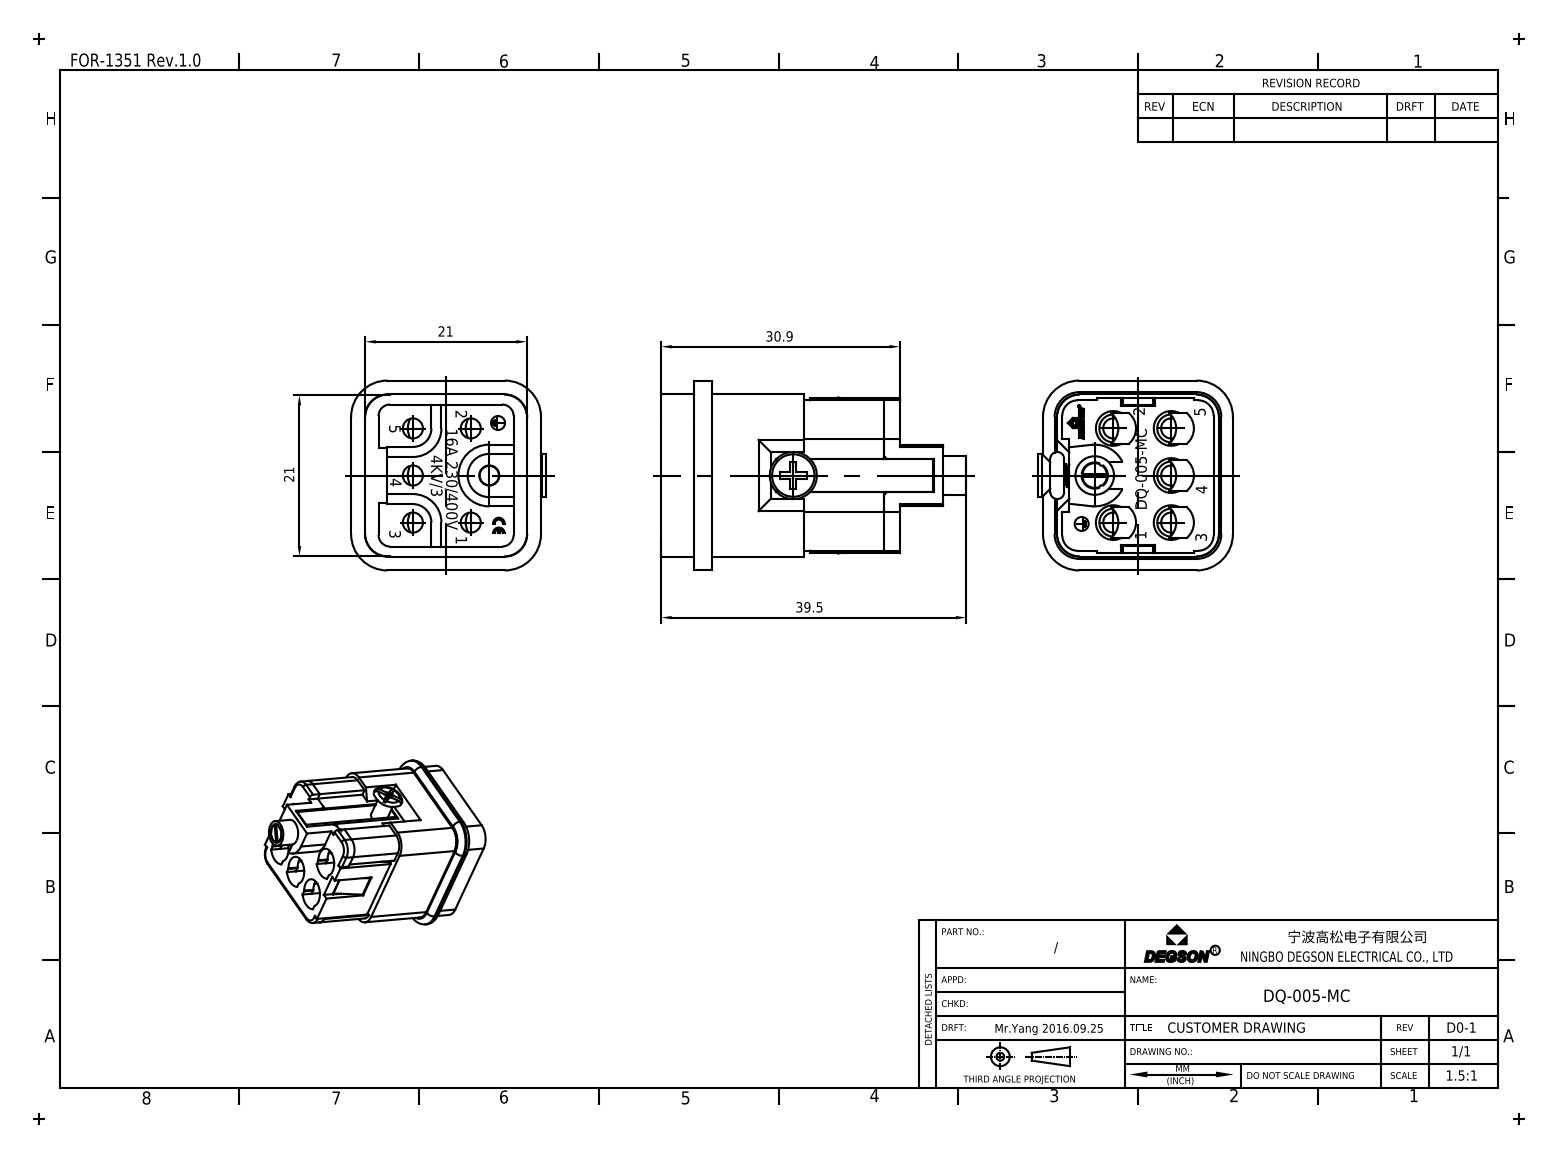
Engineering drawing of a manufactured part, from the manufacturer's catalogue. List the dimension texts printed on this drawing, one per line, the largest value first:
39.5
30.9
21
21
